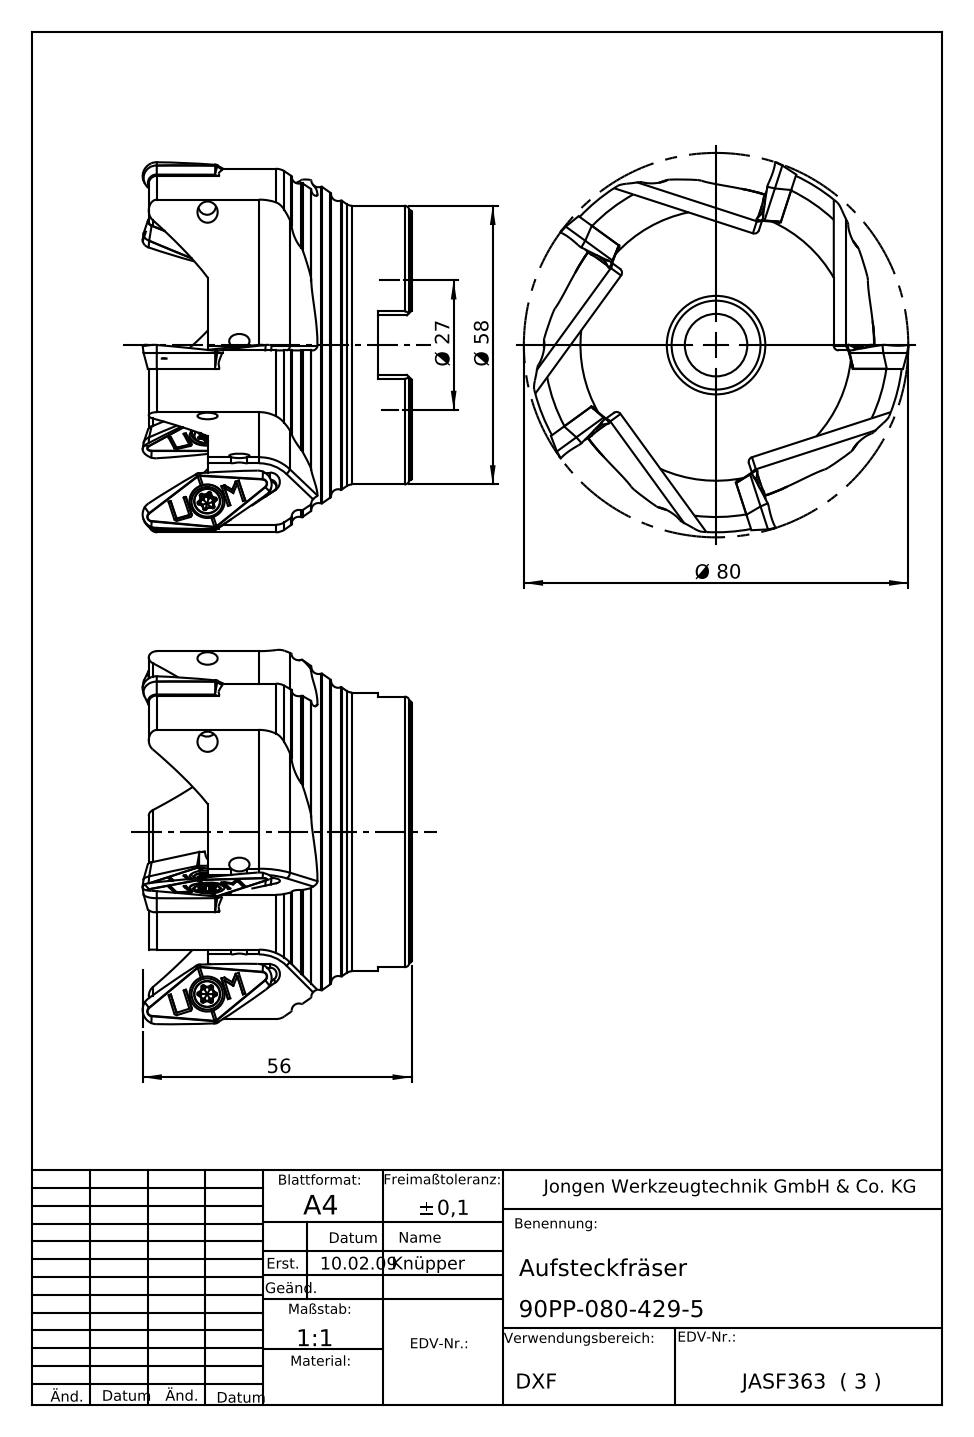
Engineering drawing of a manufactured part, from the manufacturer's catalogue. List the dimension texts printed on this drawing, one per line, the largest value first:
Ø 80
Ø 58
56
Ø 27
